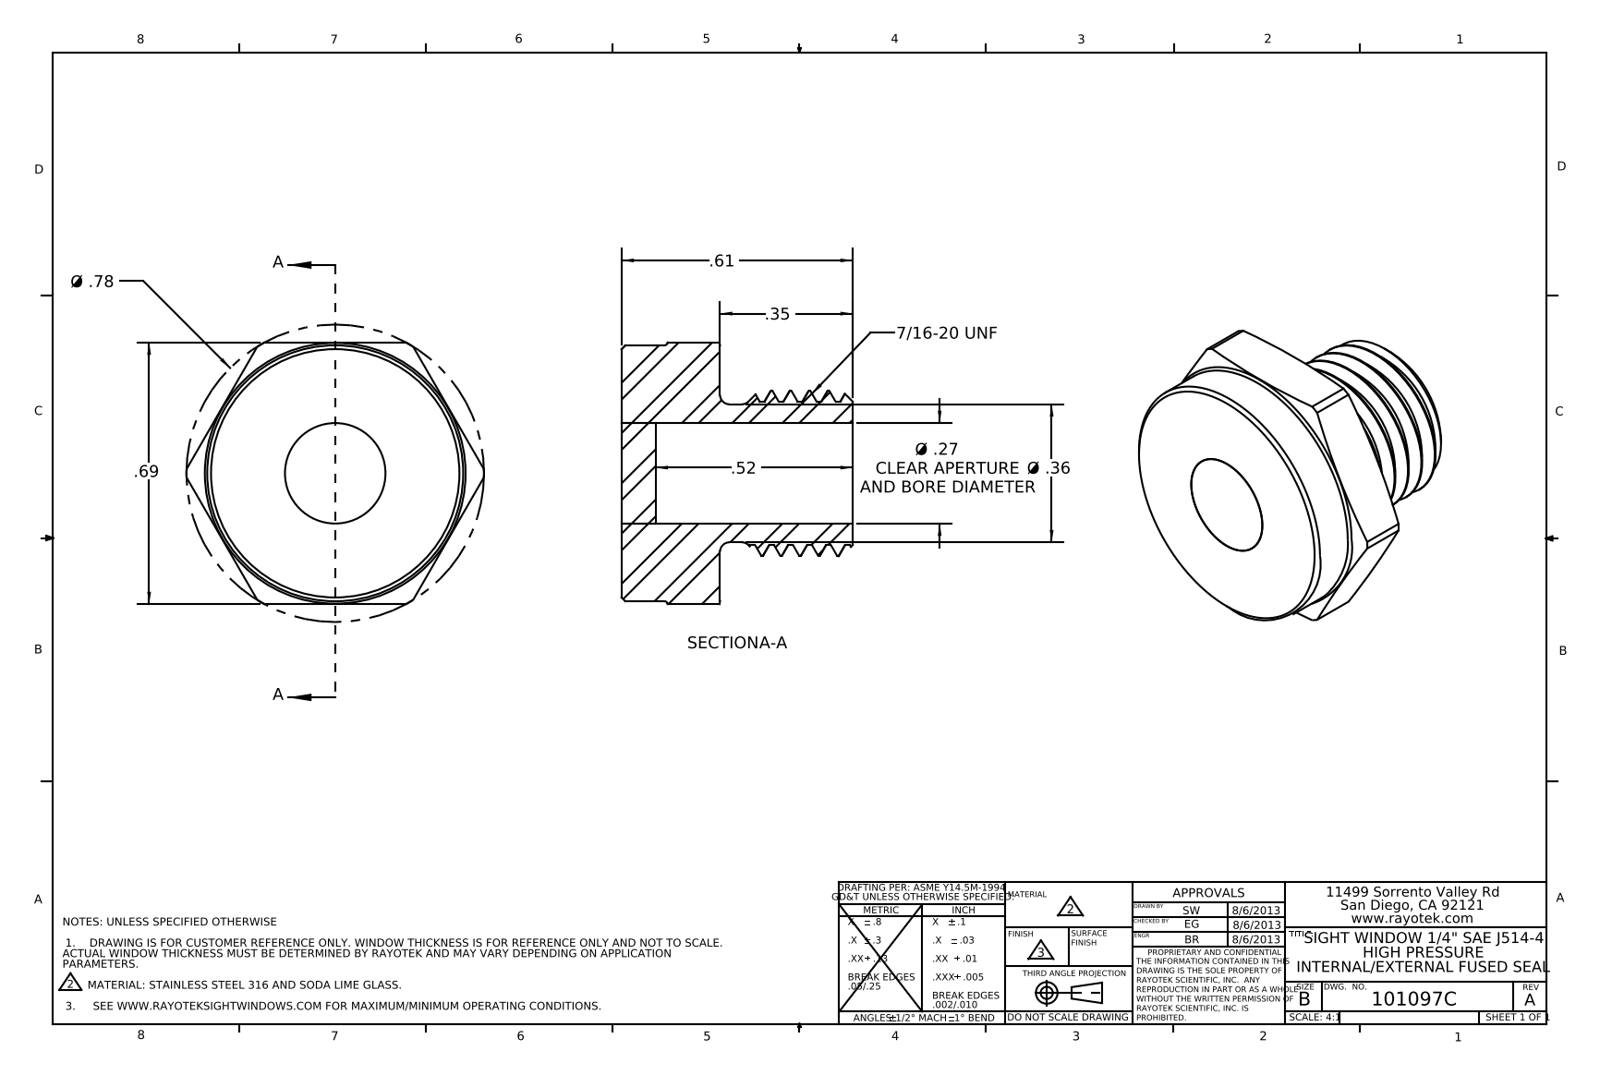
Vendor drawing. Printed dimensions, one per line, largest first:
Ø .78
.69
.61
.52
Ø .36
.35
Ø .27 CLEAR APERTURE AND BORE DIAMETER
